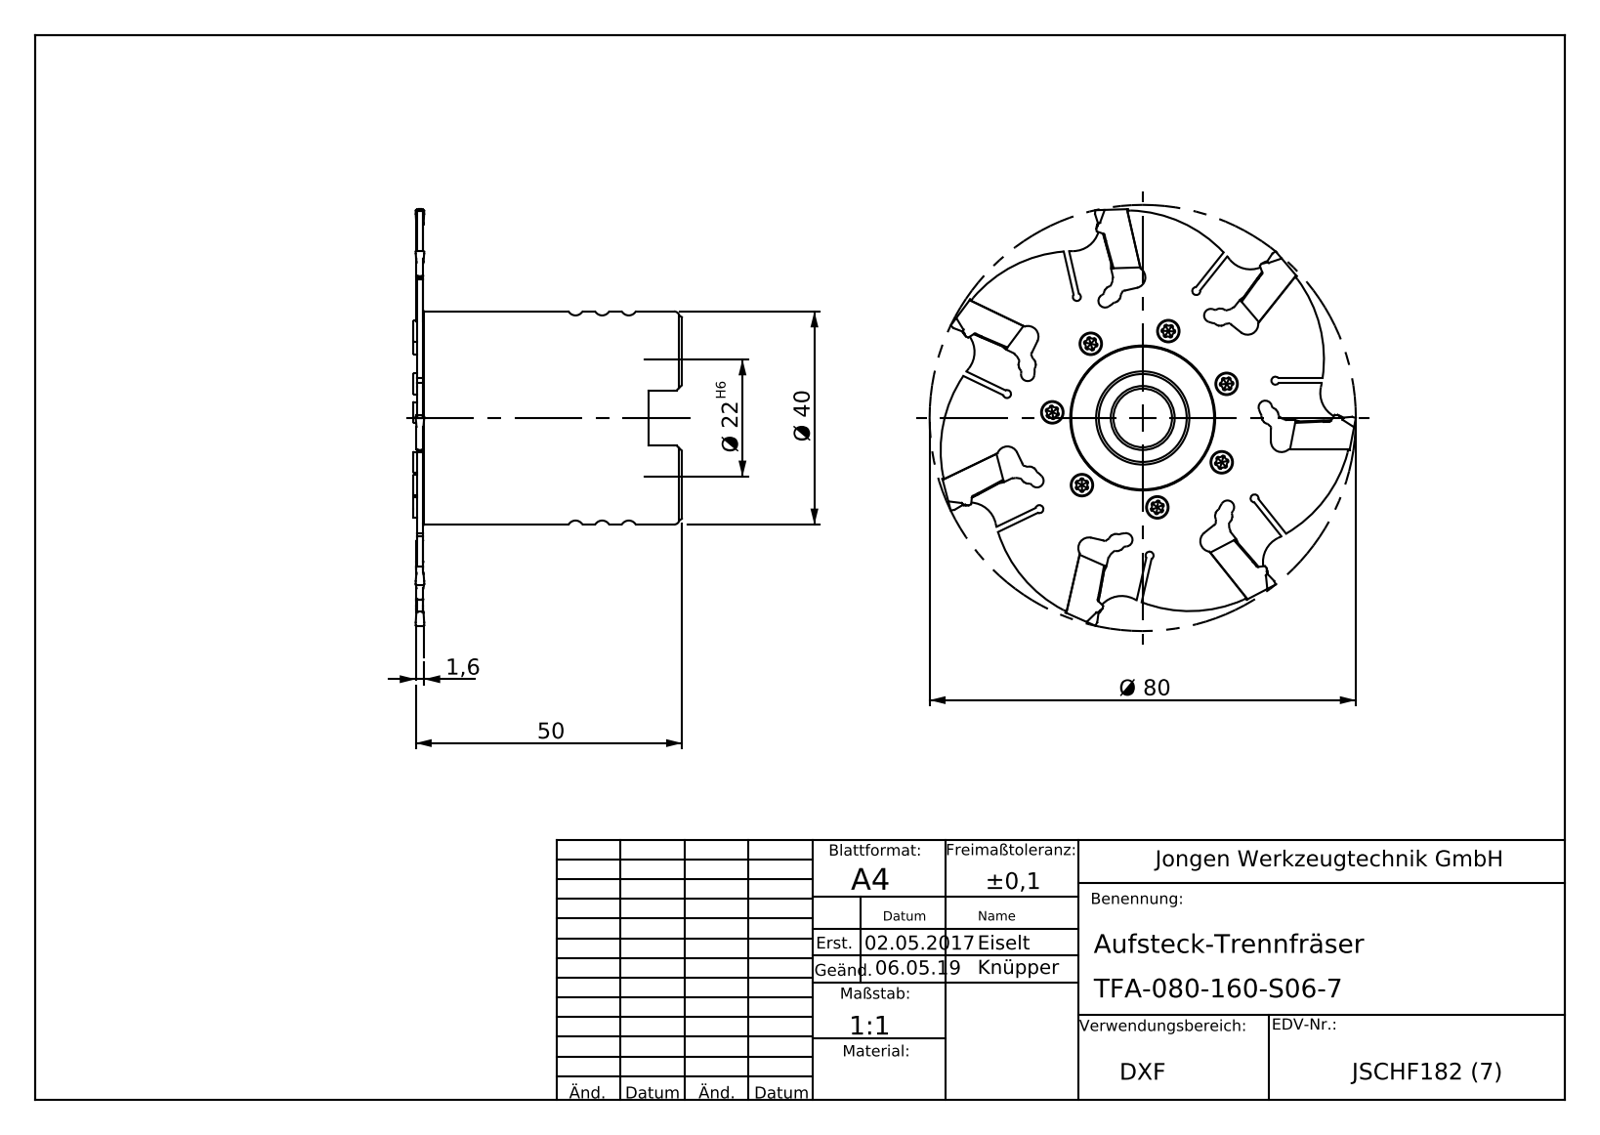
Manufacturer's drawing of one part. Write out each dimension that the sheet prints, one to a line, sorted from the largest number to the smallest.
Ø 80
50
Ø 40
Ø 22 H6
1,6
